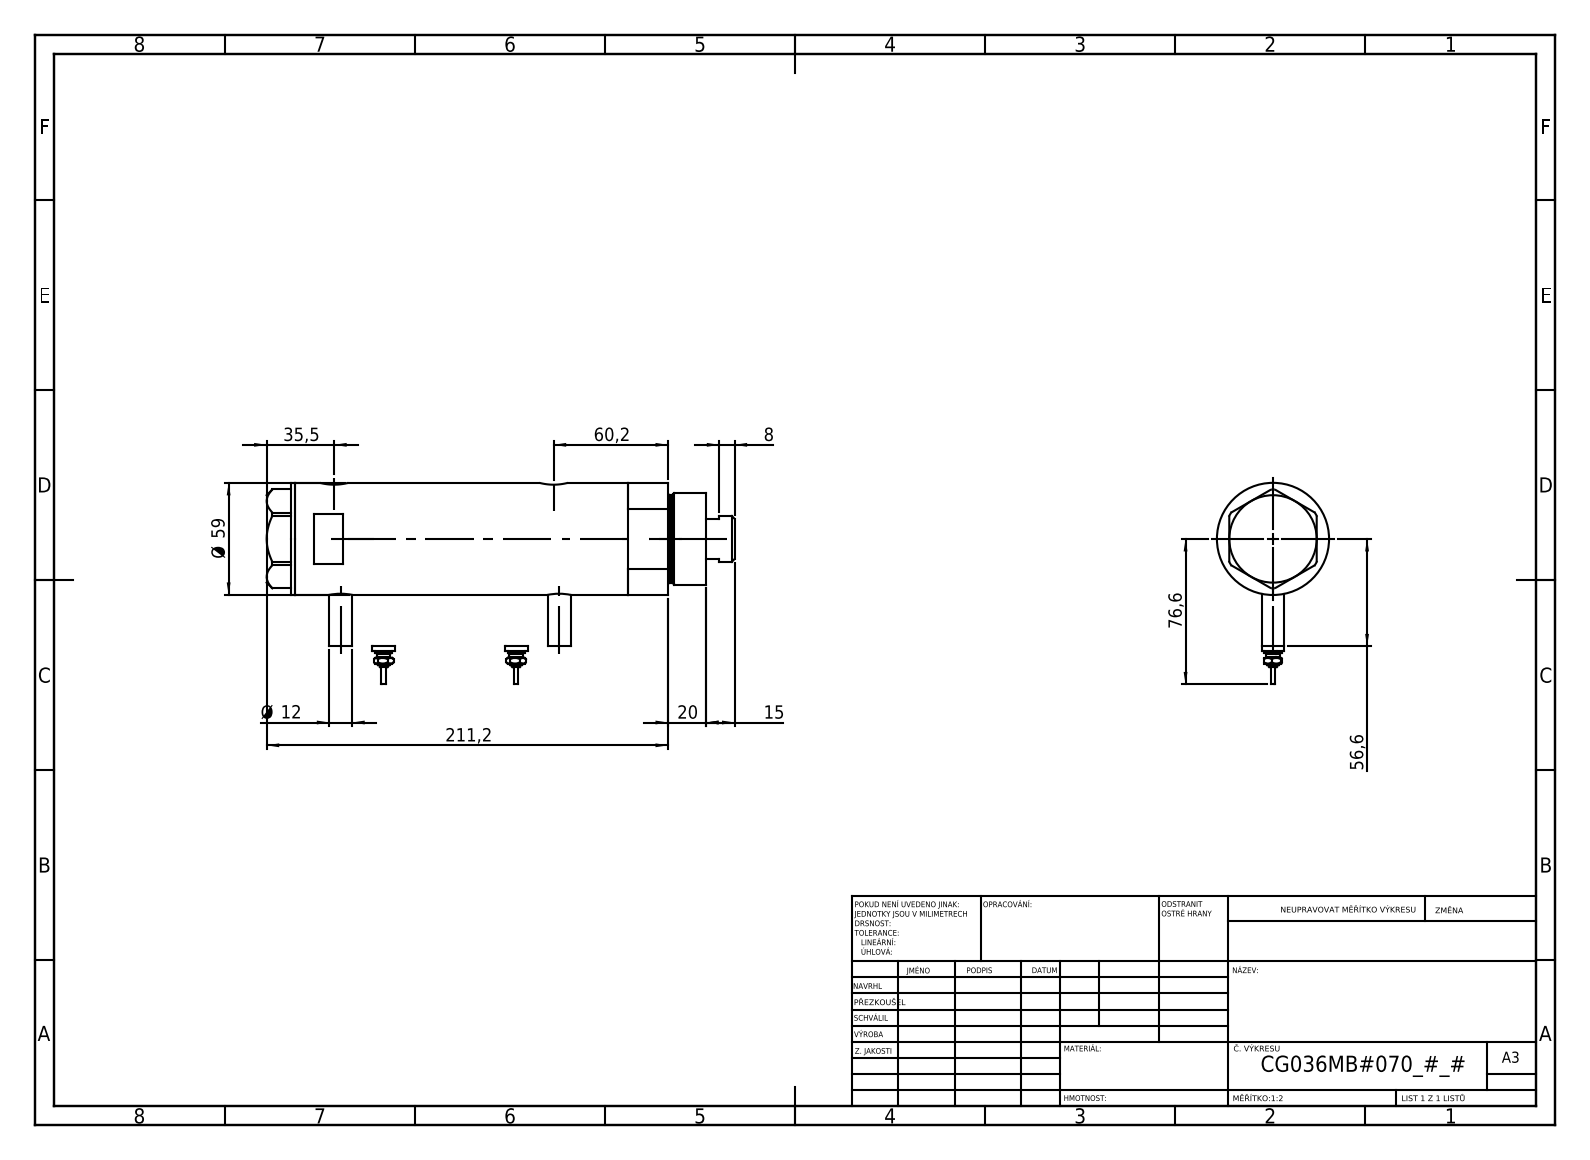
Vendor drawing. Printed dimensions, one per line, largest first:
211,2
76,6
60,2
Ø 59
56,6
35,5
20
15
Ø 12
8
